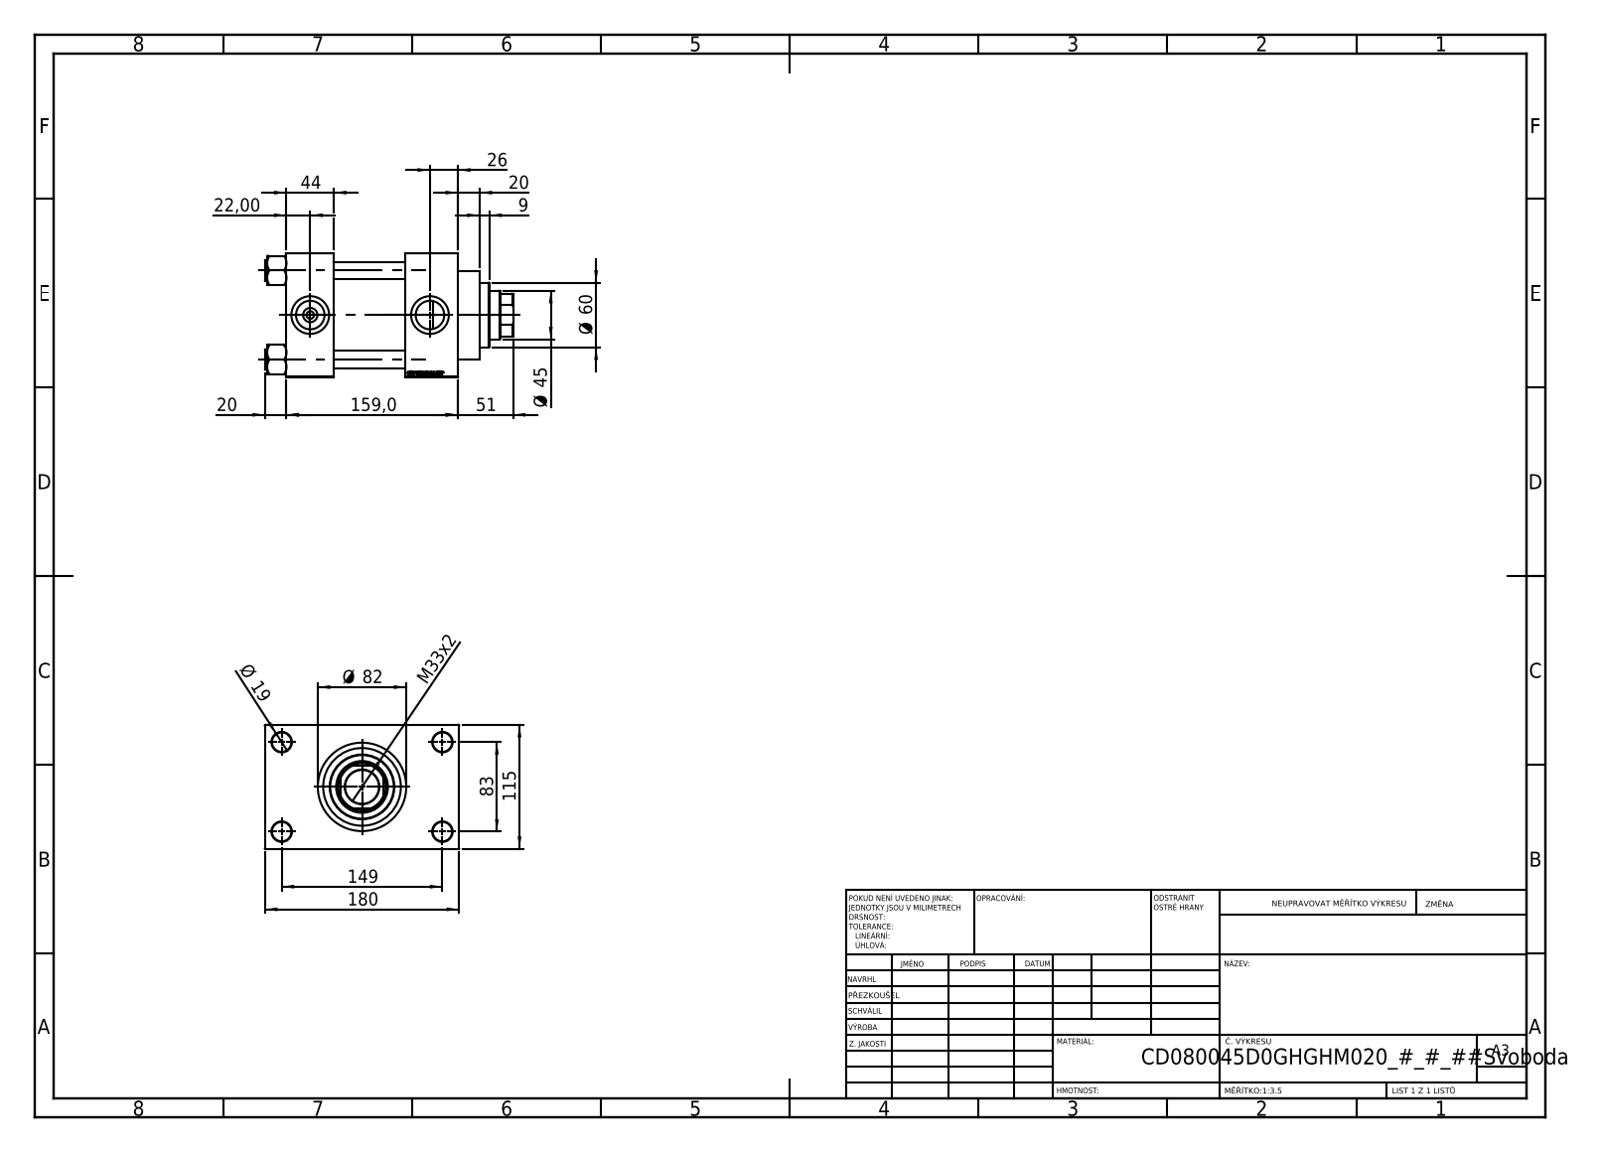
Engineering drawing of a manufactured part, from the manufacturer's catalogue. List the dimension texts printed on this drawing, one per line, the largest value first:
180
159,0
149
115
83
Ø 82
Ø 60
51
Ø 45
44
M33x2
26
22,00
20
20
Ø 19
9
